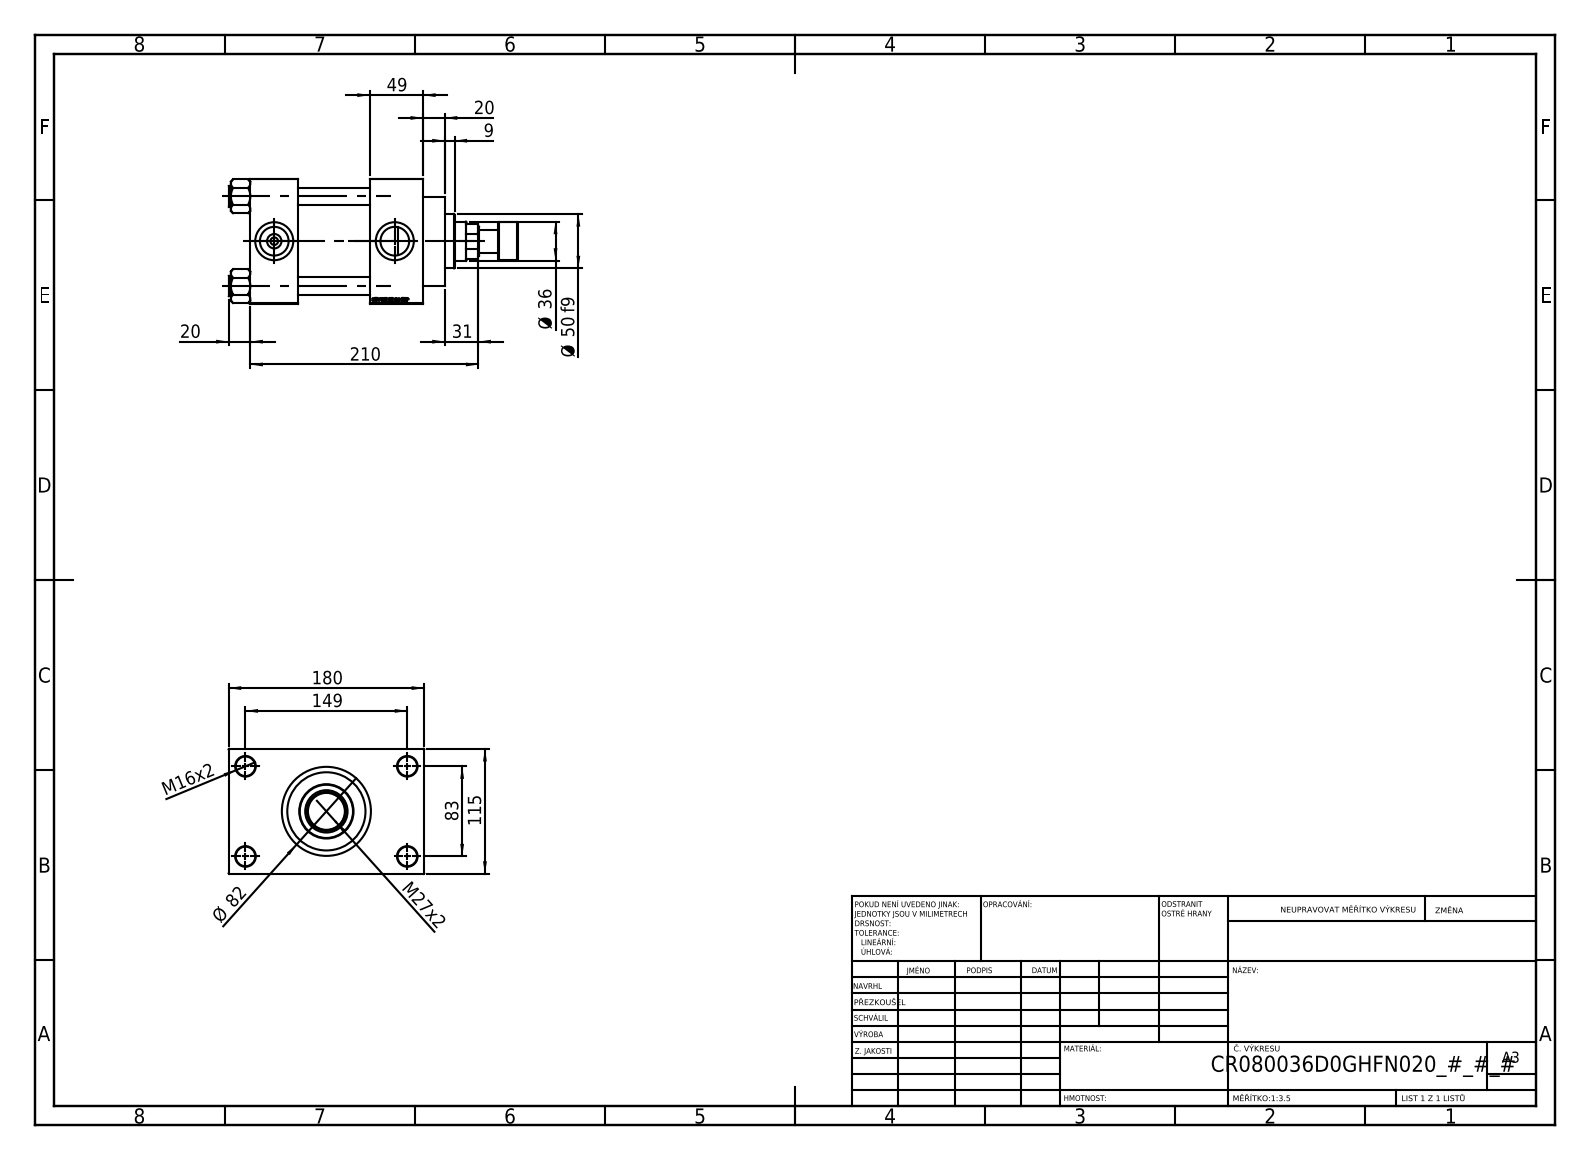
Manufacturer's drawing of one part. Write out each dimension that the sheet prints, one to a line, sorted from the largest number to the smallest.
210
180
149
115
83
Ø 82
Ø 50 f9
49
Ø 36
31
M27x2
20
20
M16x2
9
